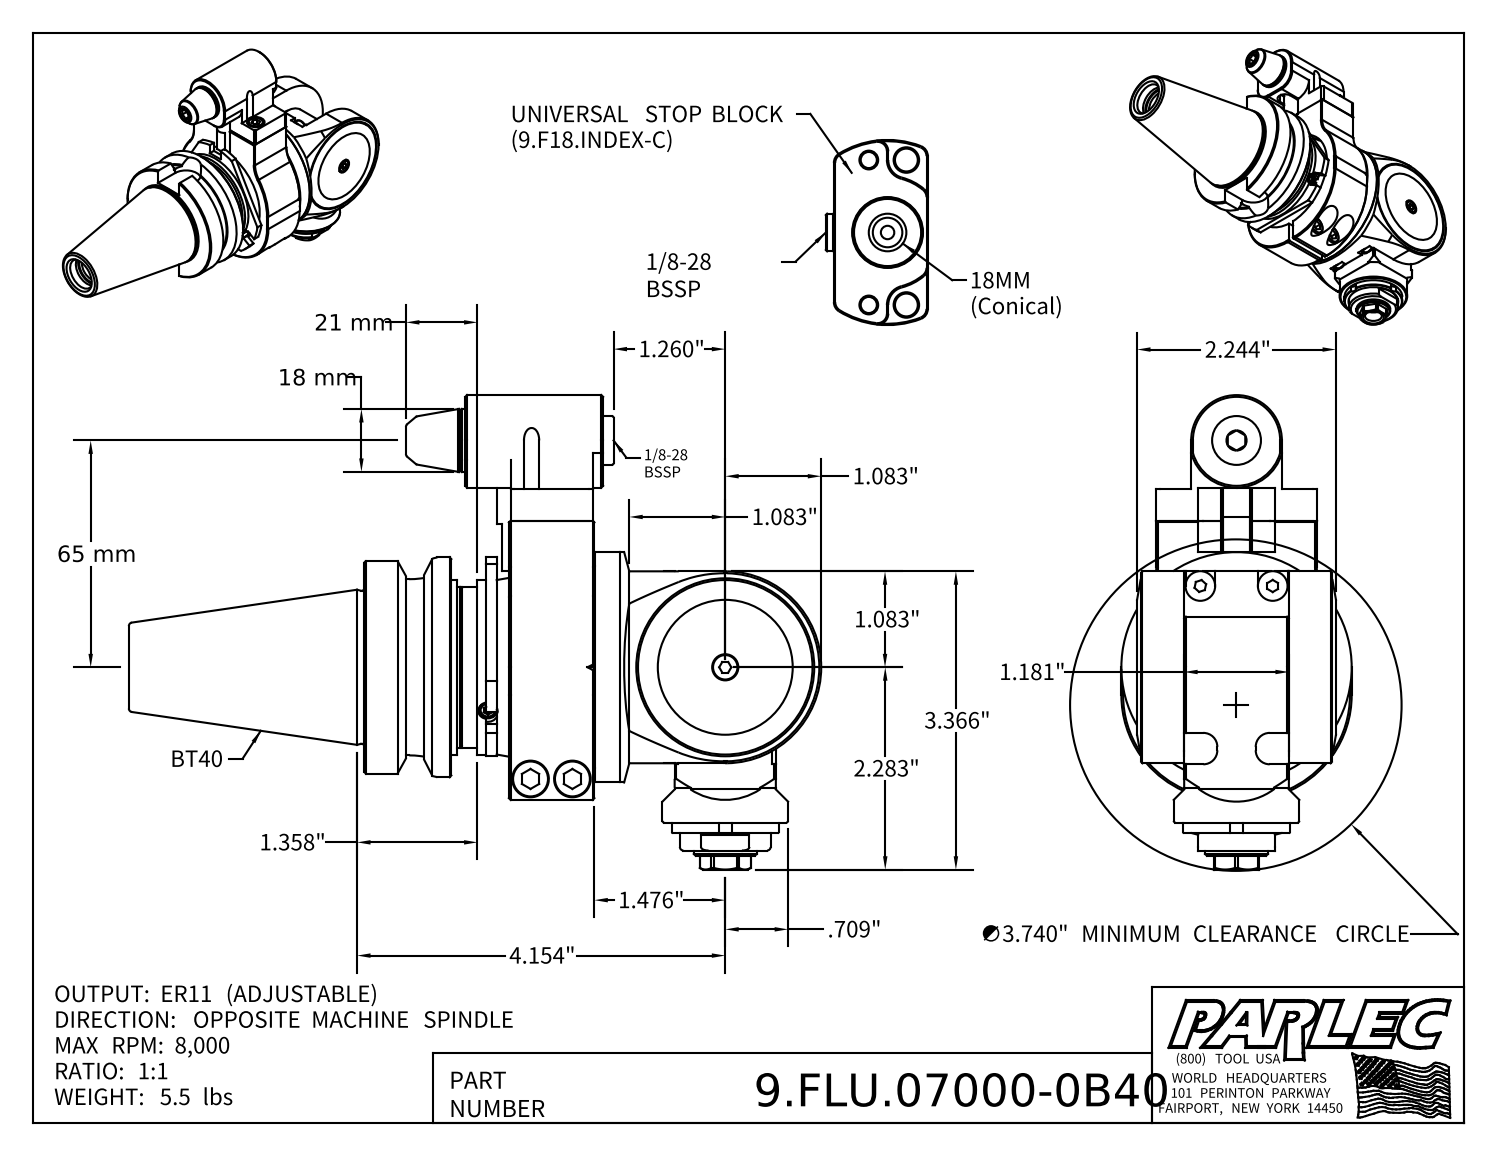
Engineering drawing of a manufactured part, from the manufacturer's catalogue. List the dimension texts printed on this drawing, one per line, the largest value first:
65 mm
21 mm
18 mm
4.154"
∅3.740" MINIMUM CLEARANCE CIRCLE
3.366"
2.283"
2.244"
1.476"
1.358"
1.260"
1.181"
1.083"
1.083"
1.083"
.709"
